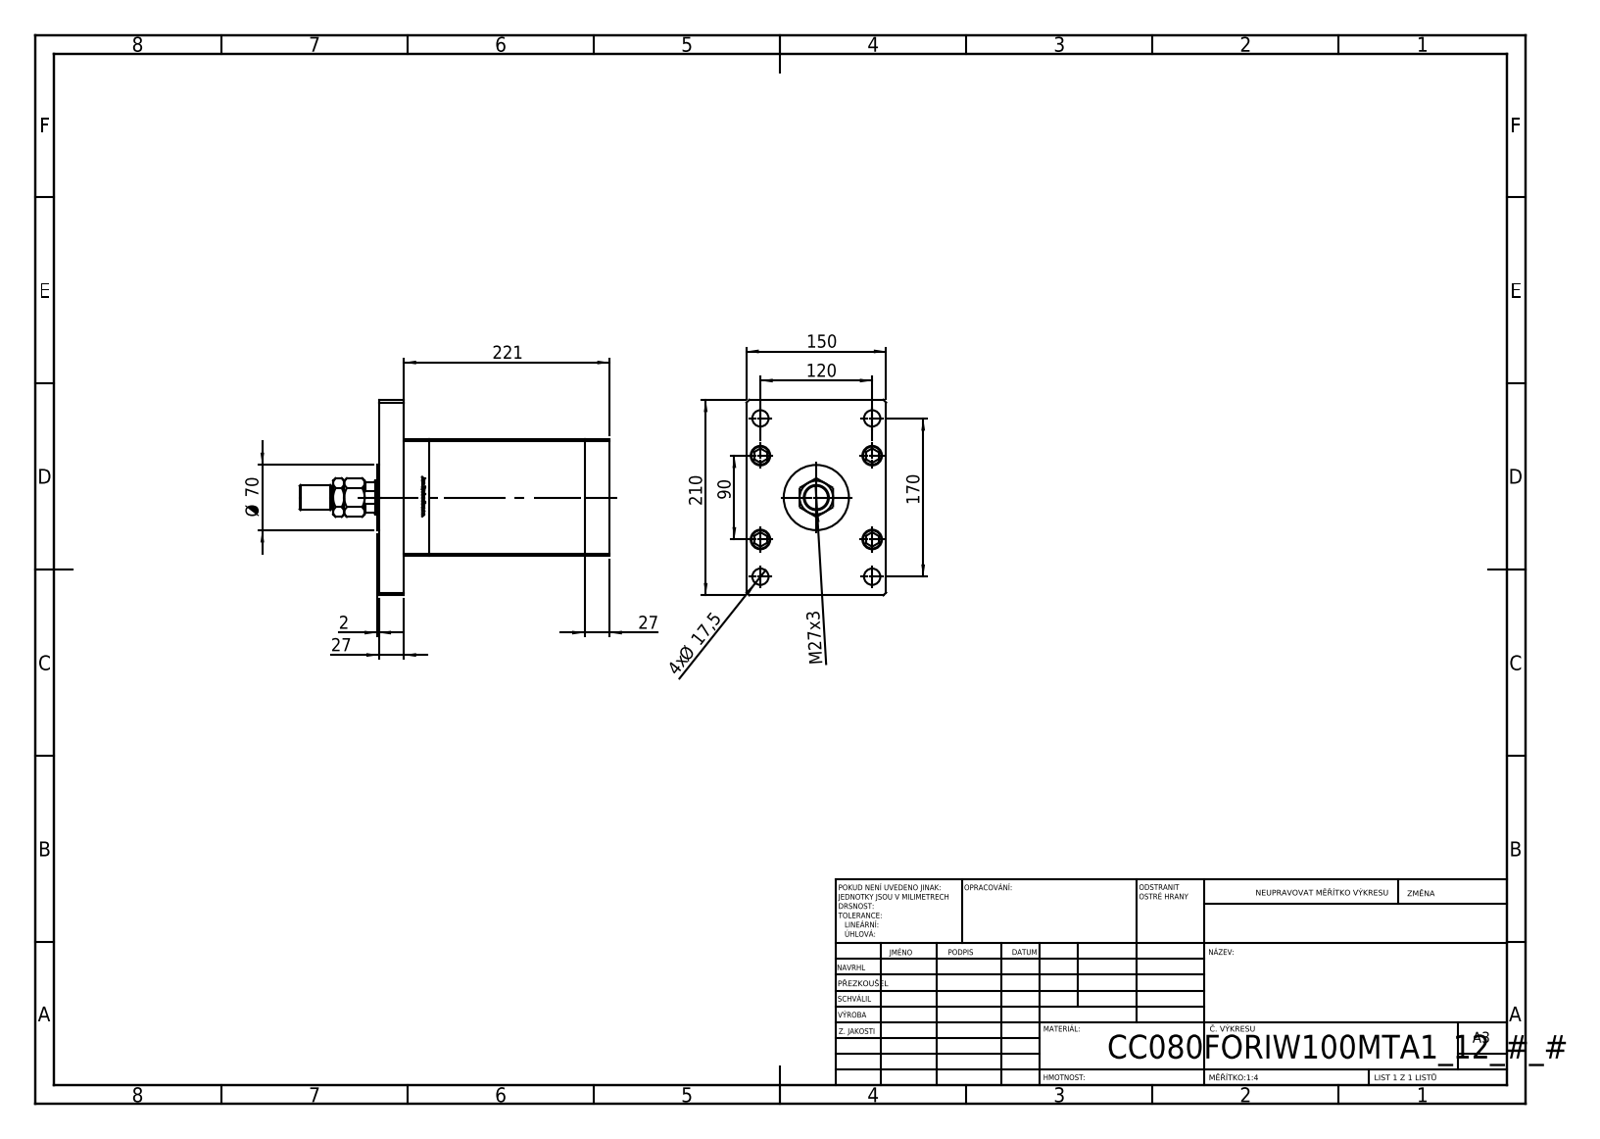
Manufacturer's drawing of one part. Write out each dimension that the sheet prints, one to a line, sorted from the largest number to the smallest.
221
210
170
150
120
90
Ø 70
27
27
M27x3
4x Ø 17,5
2
